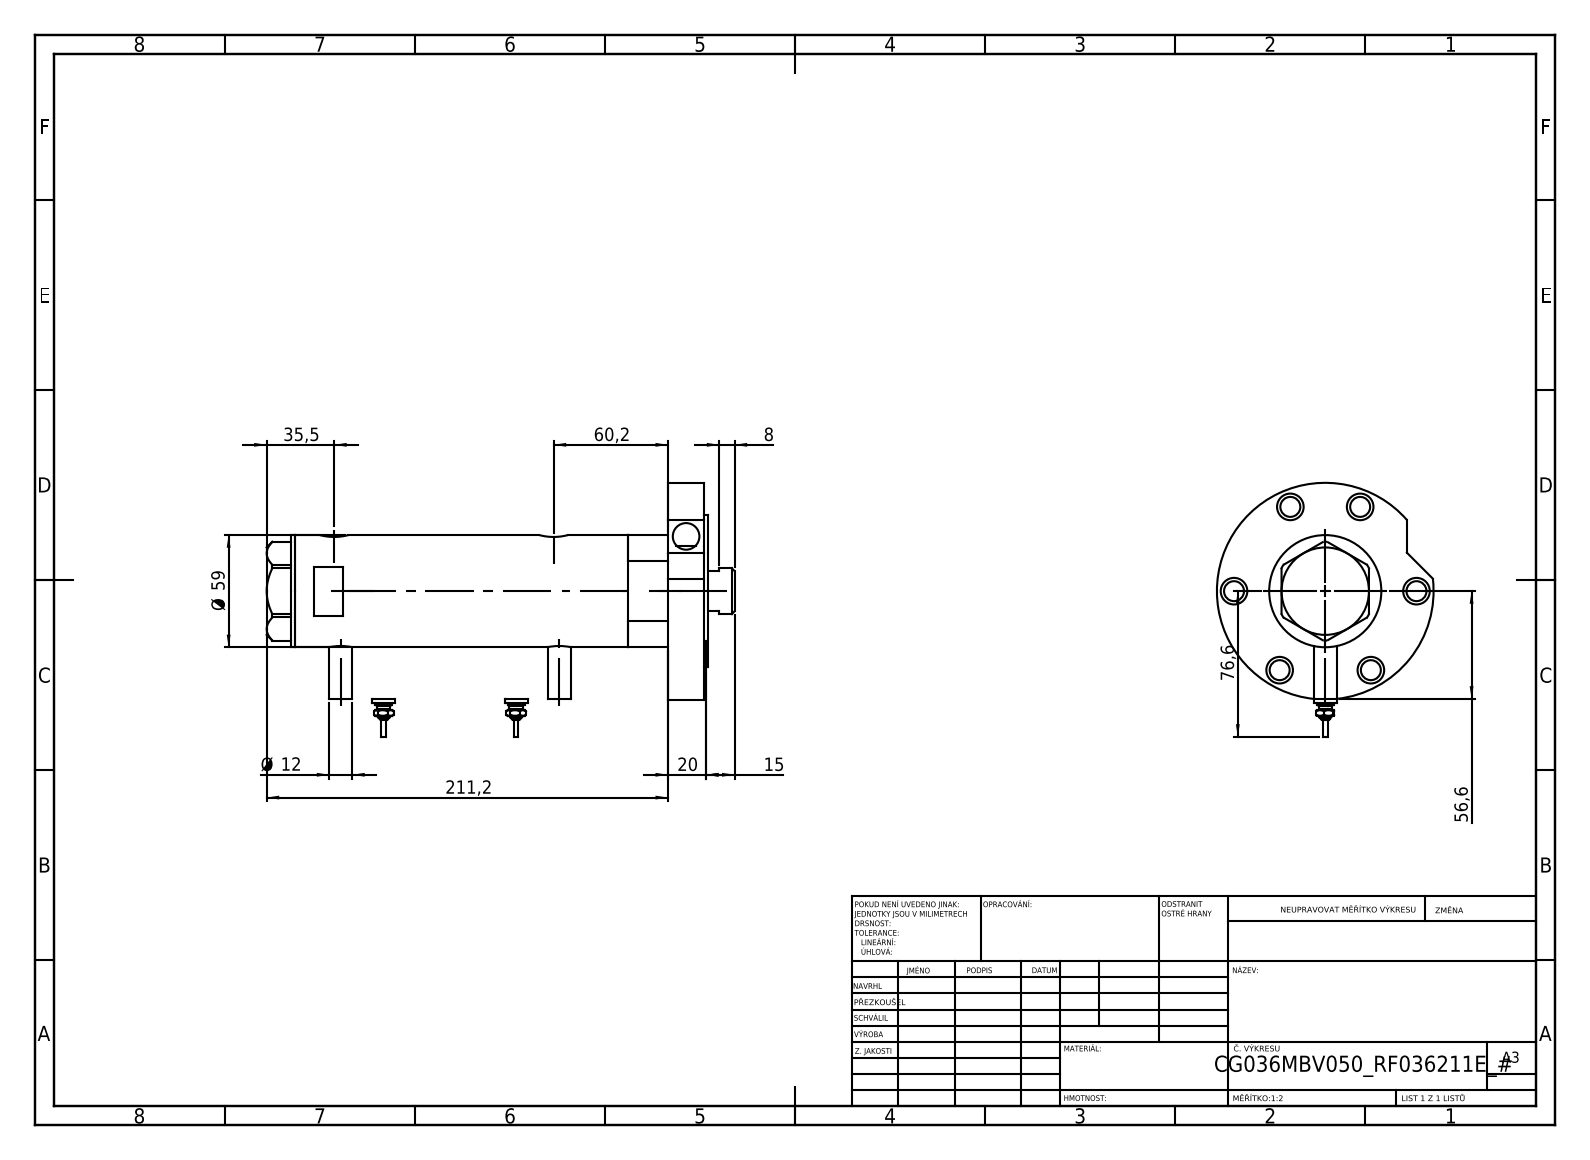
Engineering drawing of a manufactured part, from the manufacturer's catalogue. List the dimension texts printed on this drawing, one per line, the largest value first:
211,2
76,6
60,2
Ø 59
56,6
35,5
20
15
Ø 12
8
